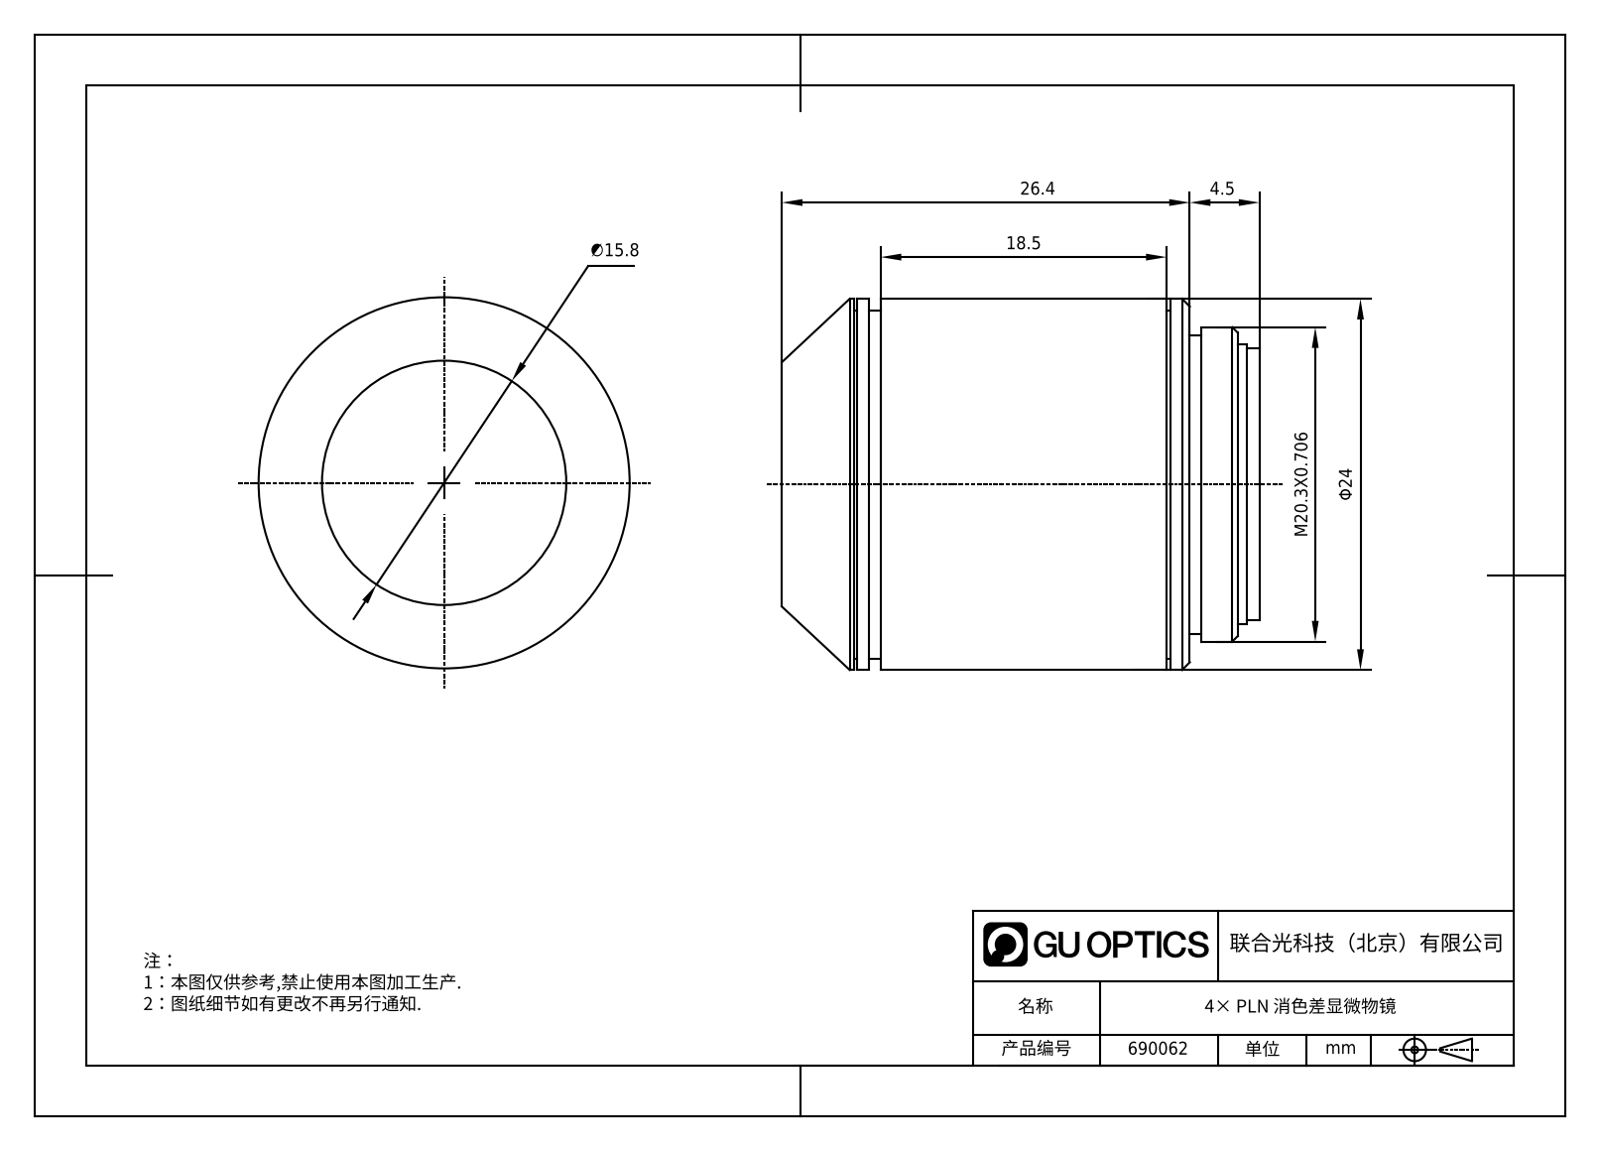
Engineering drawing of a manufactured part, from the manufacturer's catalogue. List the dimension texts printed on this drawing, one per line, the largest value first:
26.4
Φ24
M20.3X0.706
18.5
∅15.8
4.5
